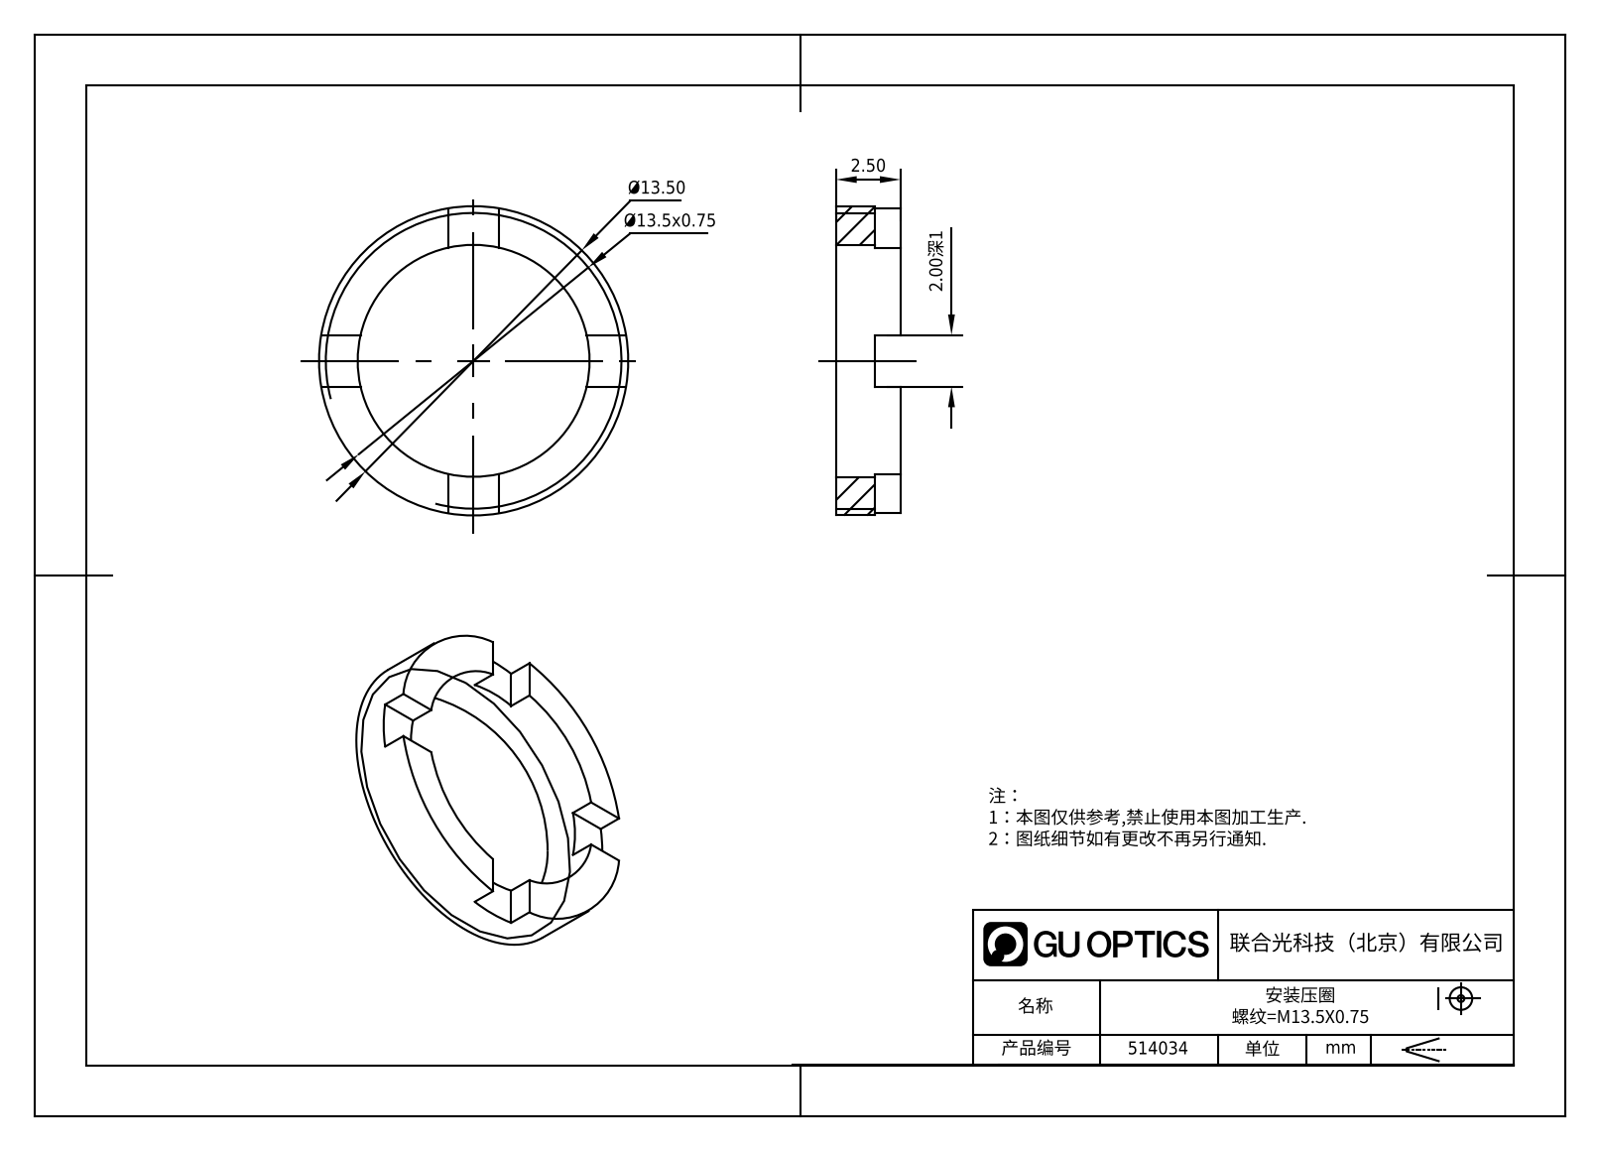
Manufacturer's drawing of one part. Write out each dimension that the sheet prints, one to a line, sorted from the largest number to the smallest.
Ø13.50
Ø13.5x0.75
2.50
2.00深1
